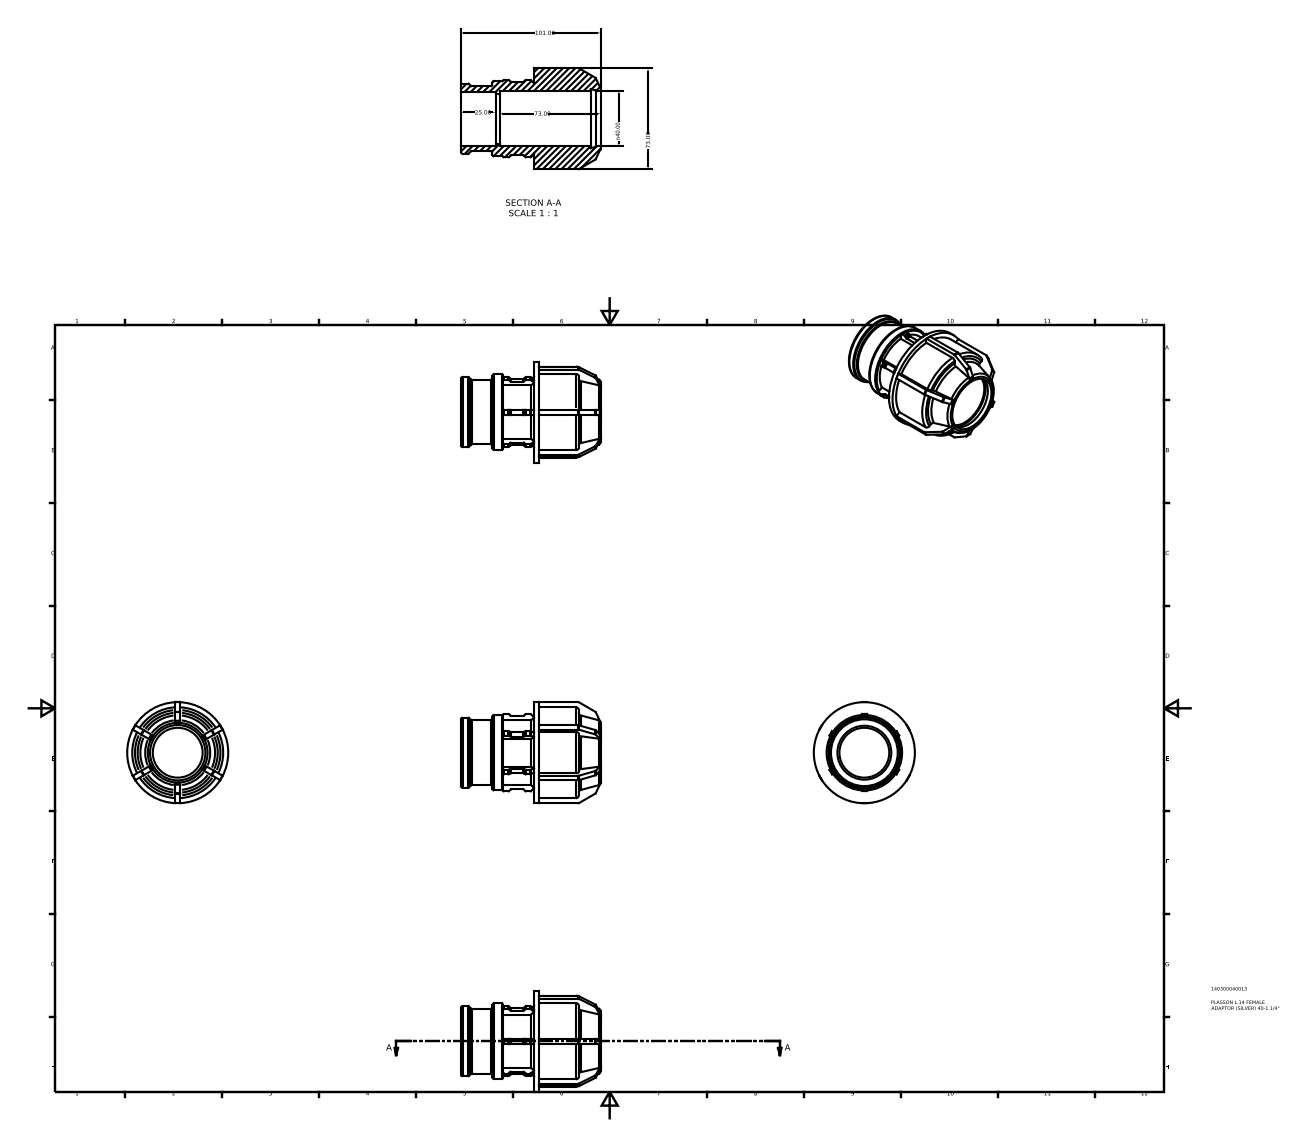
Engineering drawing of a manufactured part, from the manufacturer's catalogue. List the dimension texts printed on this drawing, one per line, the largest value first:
101.00
73.00
73.00
n40.00
25.00
